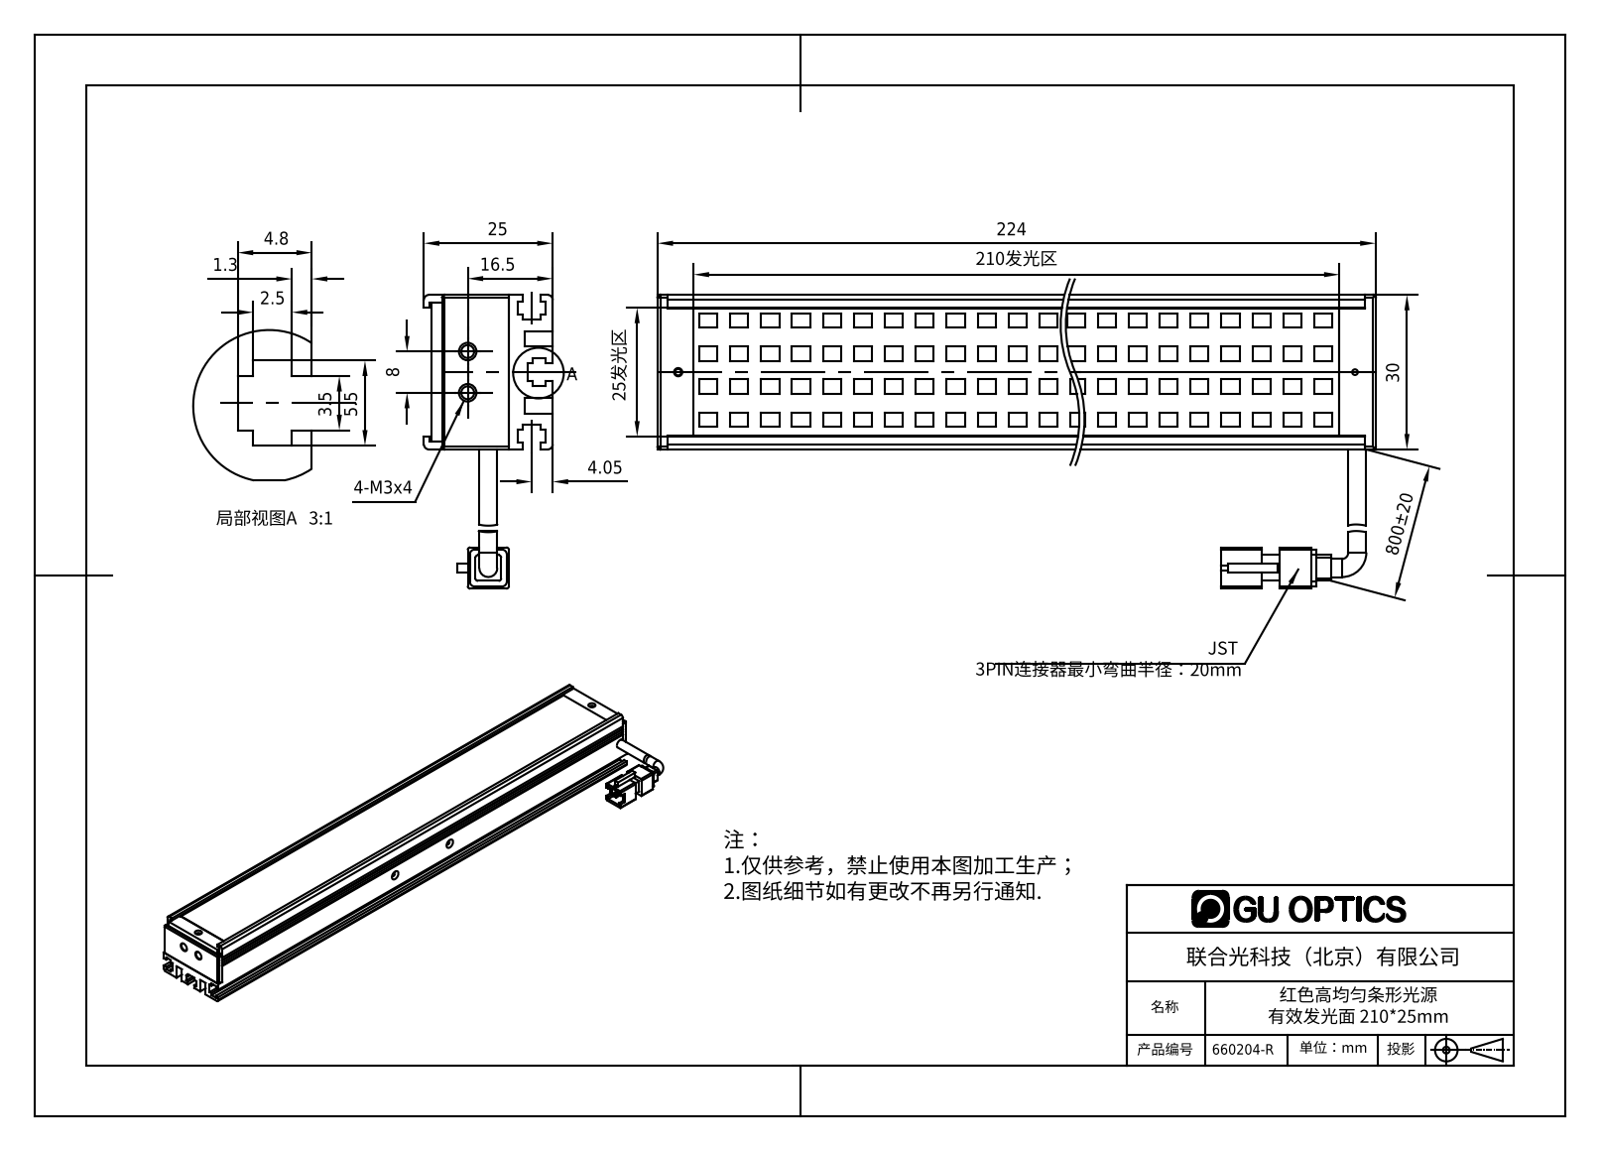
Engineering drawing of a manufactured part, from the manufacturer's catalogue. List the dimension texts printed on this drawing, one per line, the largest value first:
800±20
224
210发光区
30
25发光区
25
16.5
8
5.5
4.8
4.05
3.5
2.5
1.3
